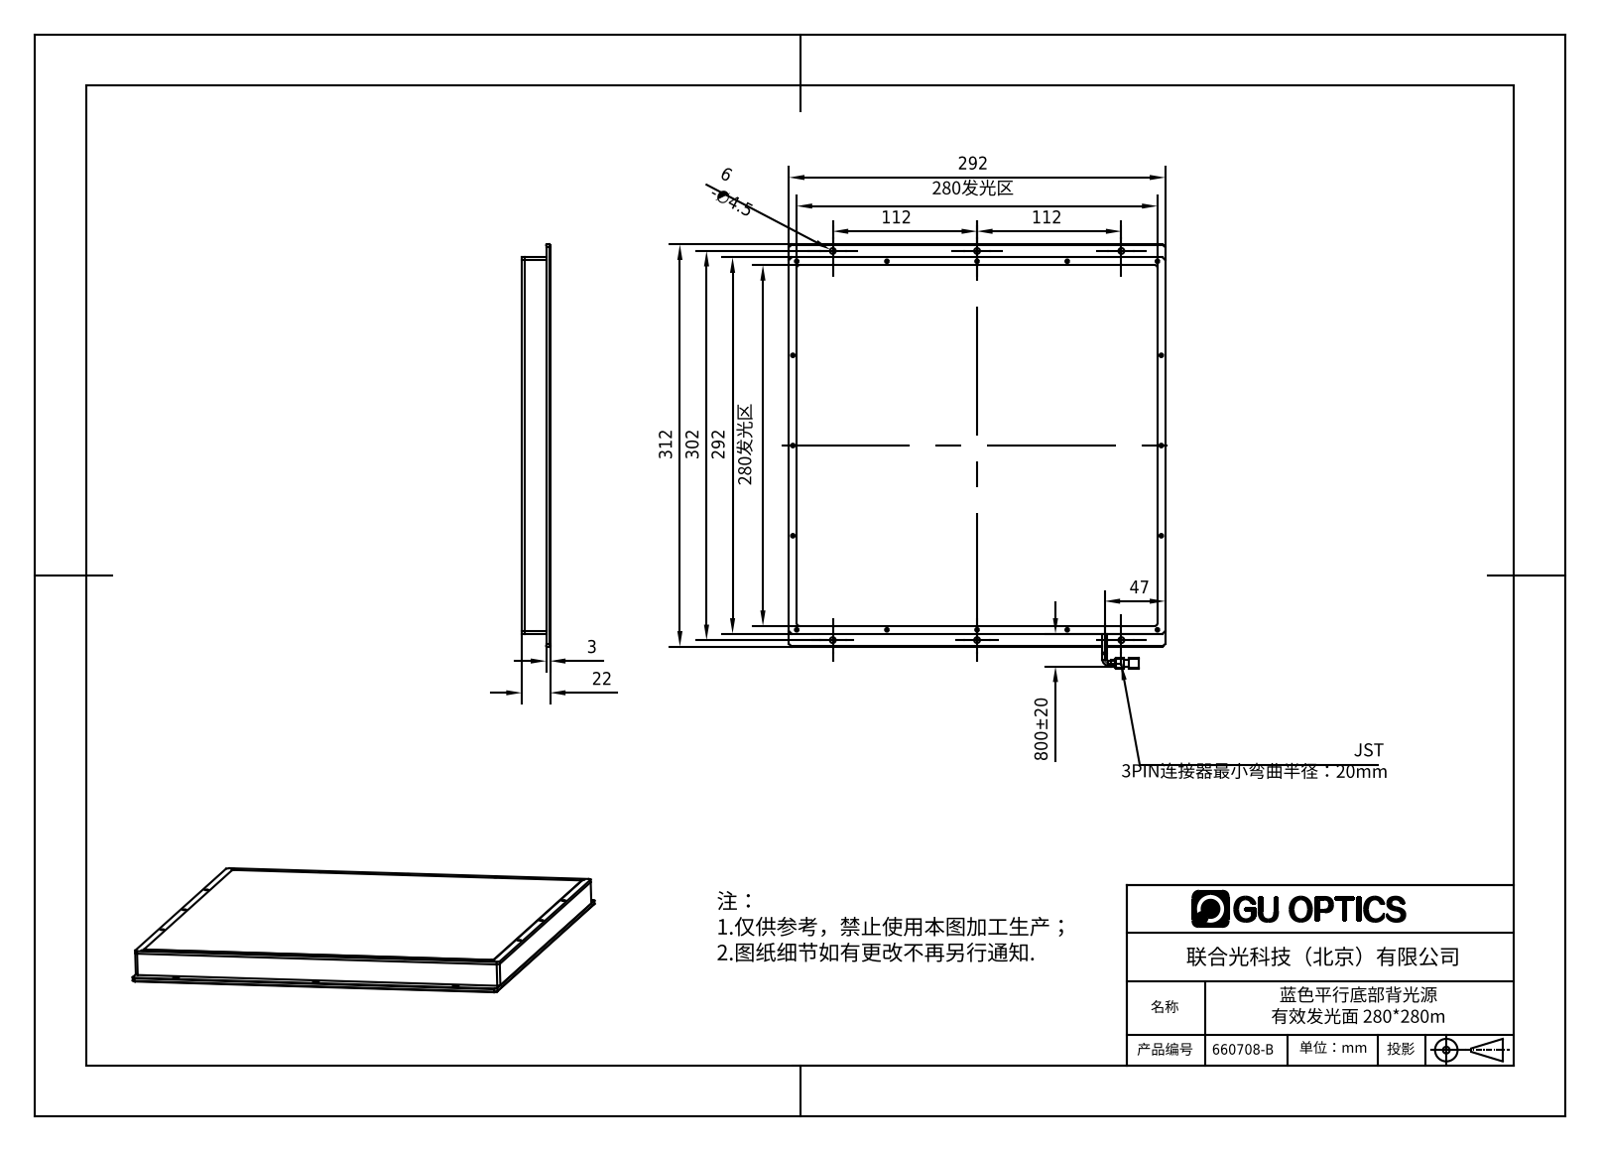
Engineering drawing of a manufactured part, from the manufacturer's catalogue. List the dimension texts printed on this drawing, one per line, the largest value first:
800±20
312
302
292
292
280发光区
280发光区
112
112
47
22
6 -∅4.5
3
